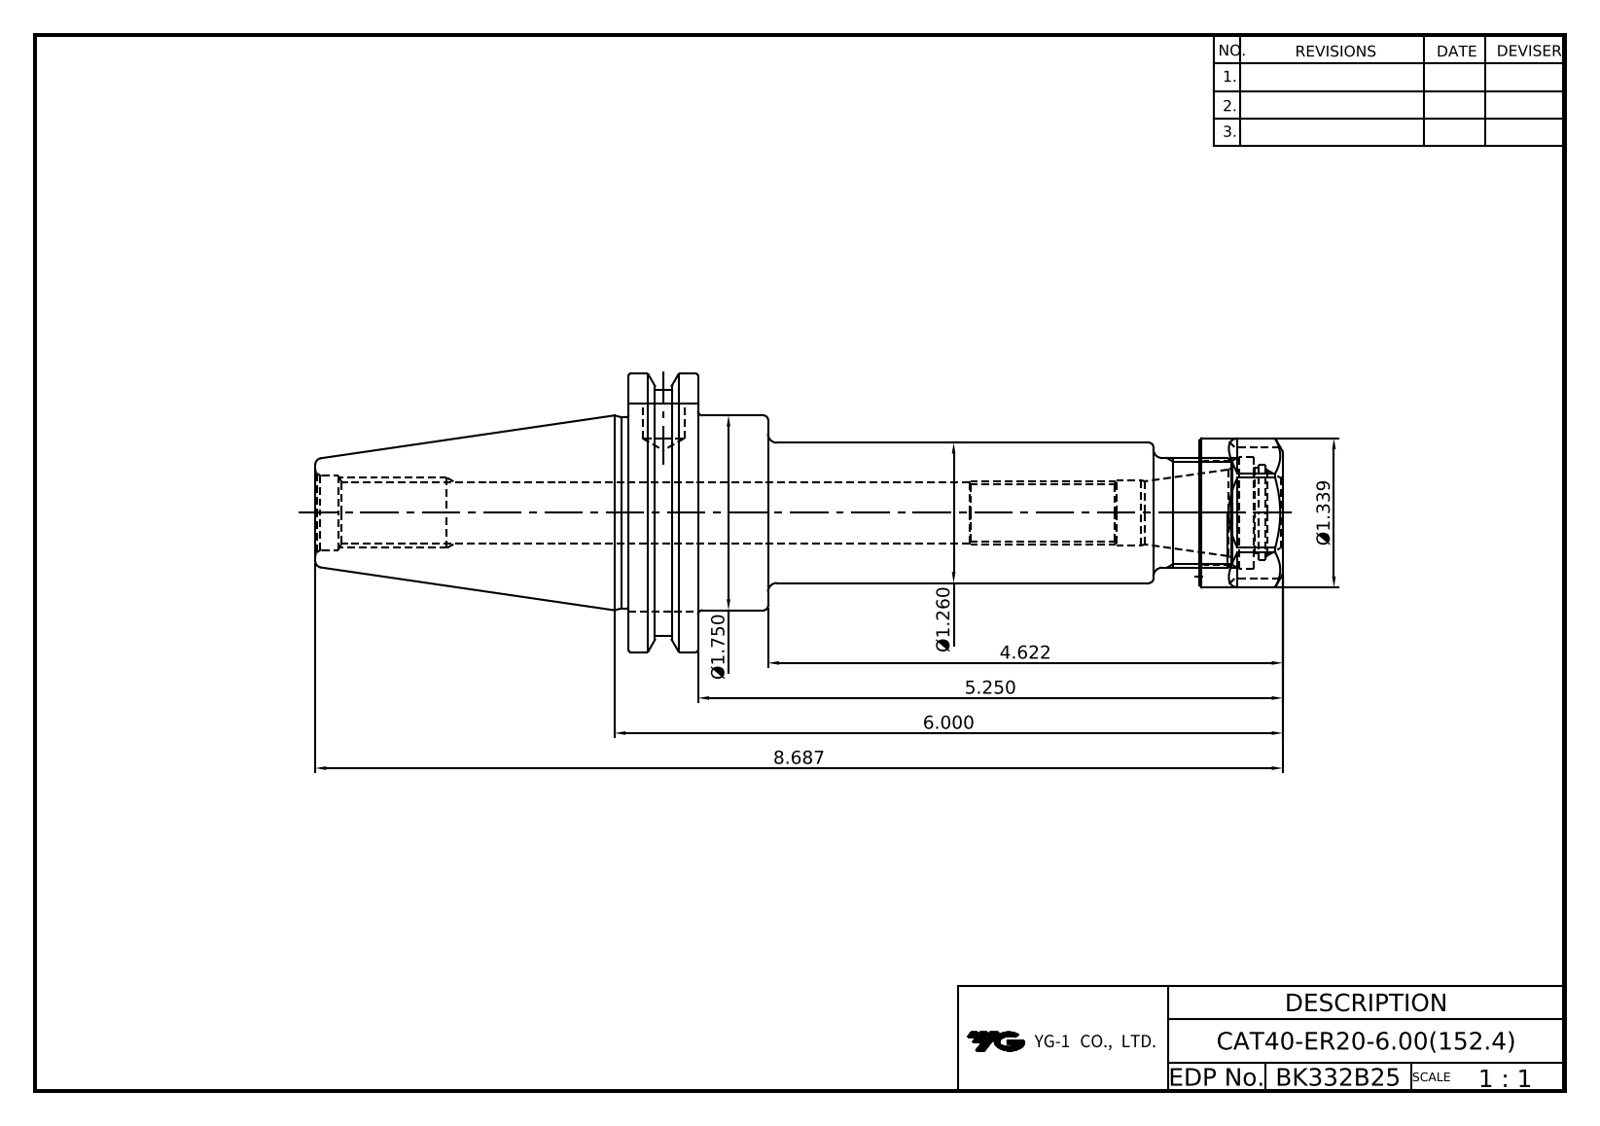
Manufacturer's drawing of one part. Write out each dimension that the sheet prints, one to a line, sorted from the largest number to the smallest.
8.687
6.000
5.250
4.622
Ø1.750
Ø1.339
Ø1.260
